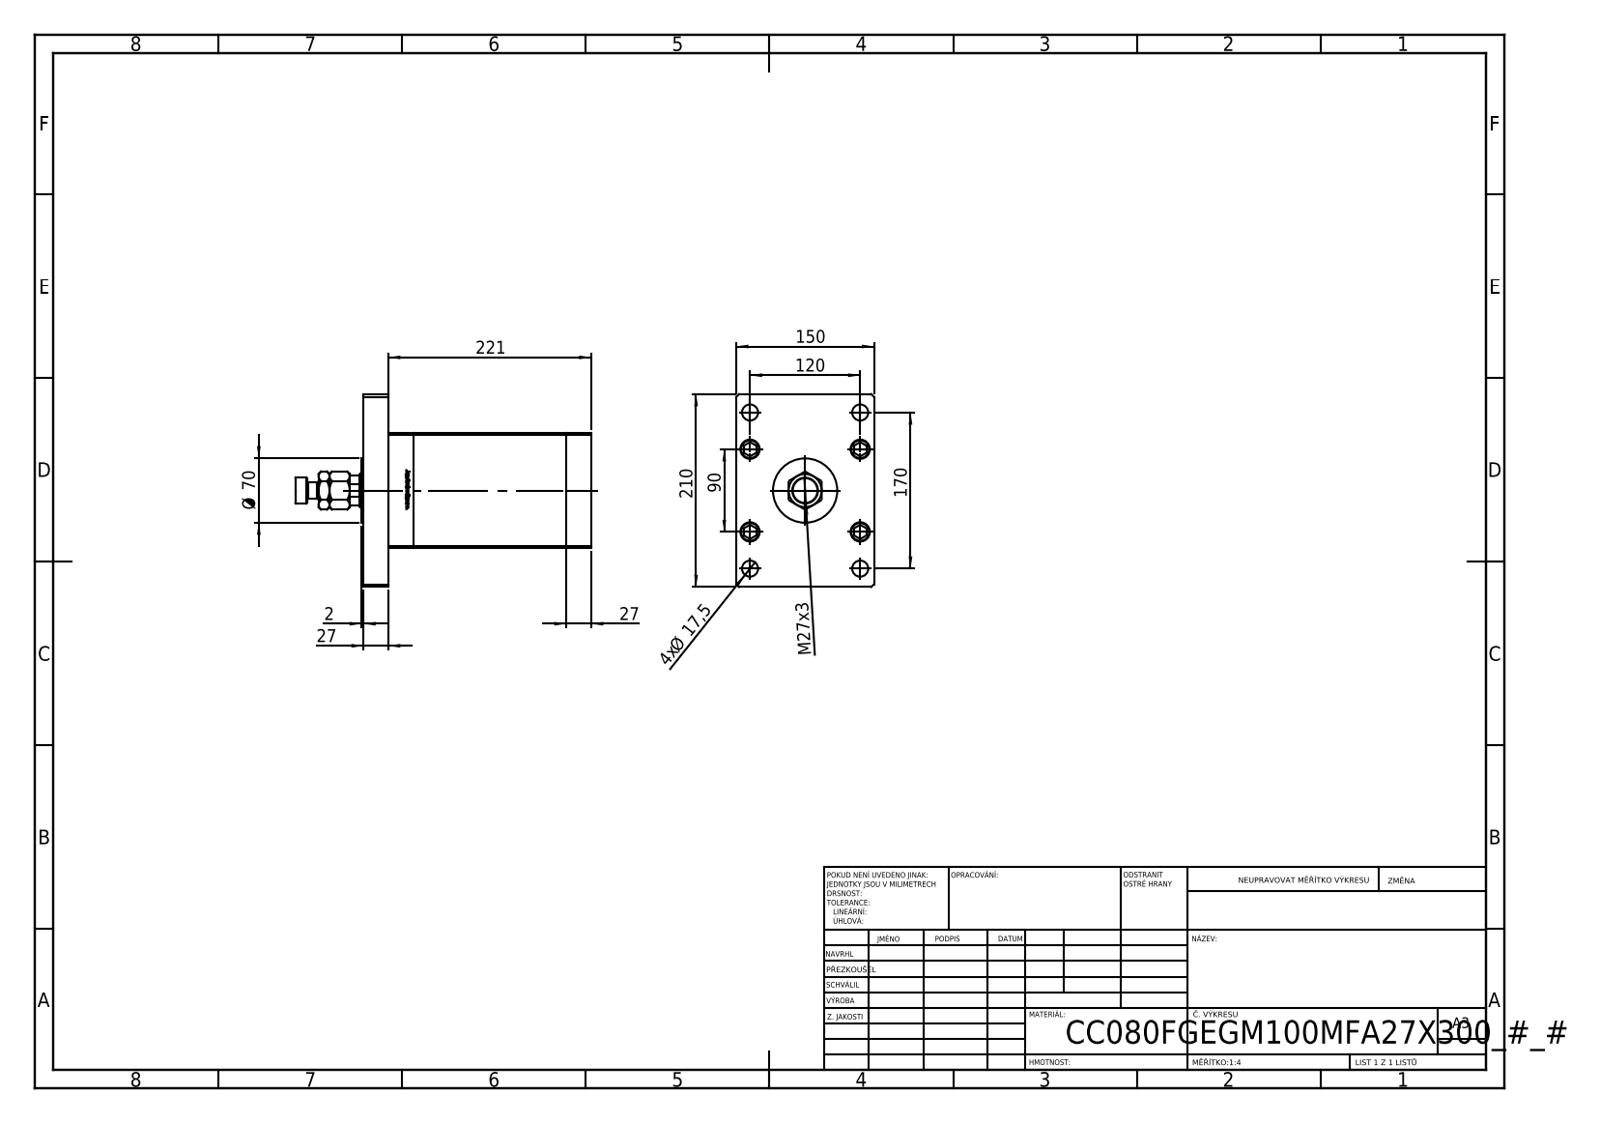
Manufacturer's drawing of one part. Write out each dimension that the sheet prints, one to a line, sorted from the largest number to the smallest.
221
210
170
150
120
90
Ø 70
27
27
M27x3
4x Ø 17,5
2
